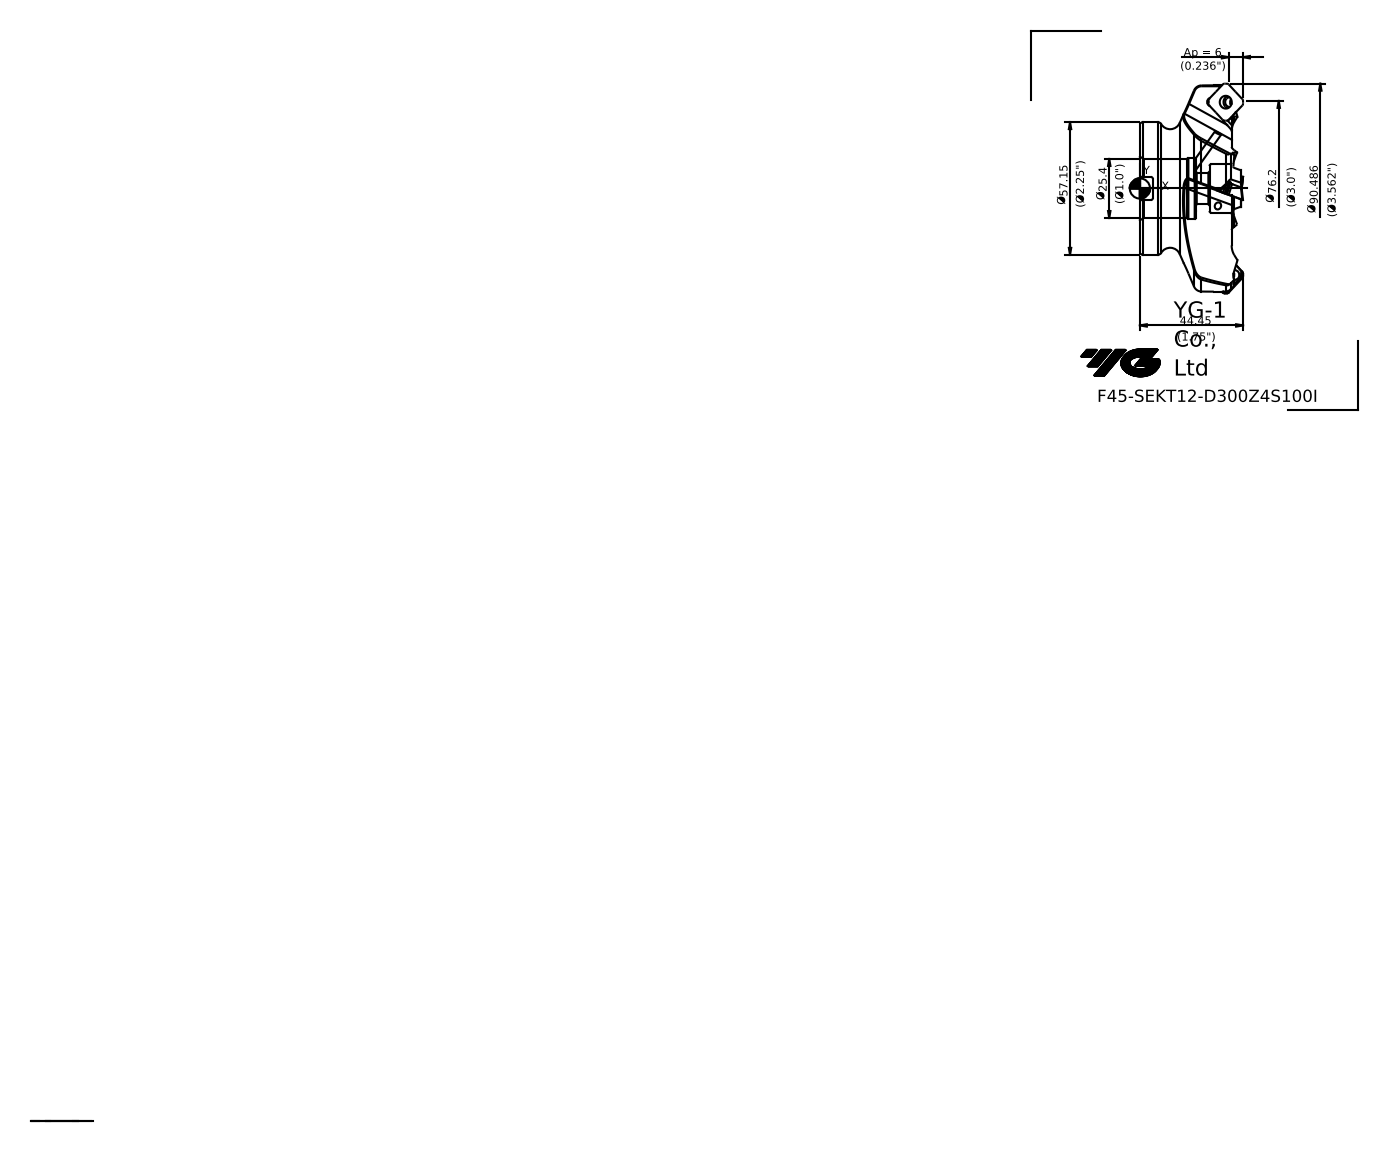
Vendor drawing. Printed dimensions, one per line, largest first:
90.486 Ø
76.2 Ø
Ø 57.15
44.45
Ø 25.4
Ap = 6
